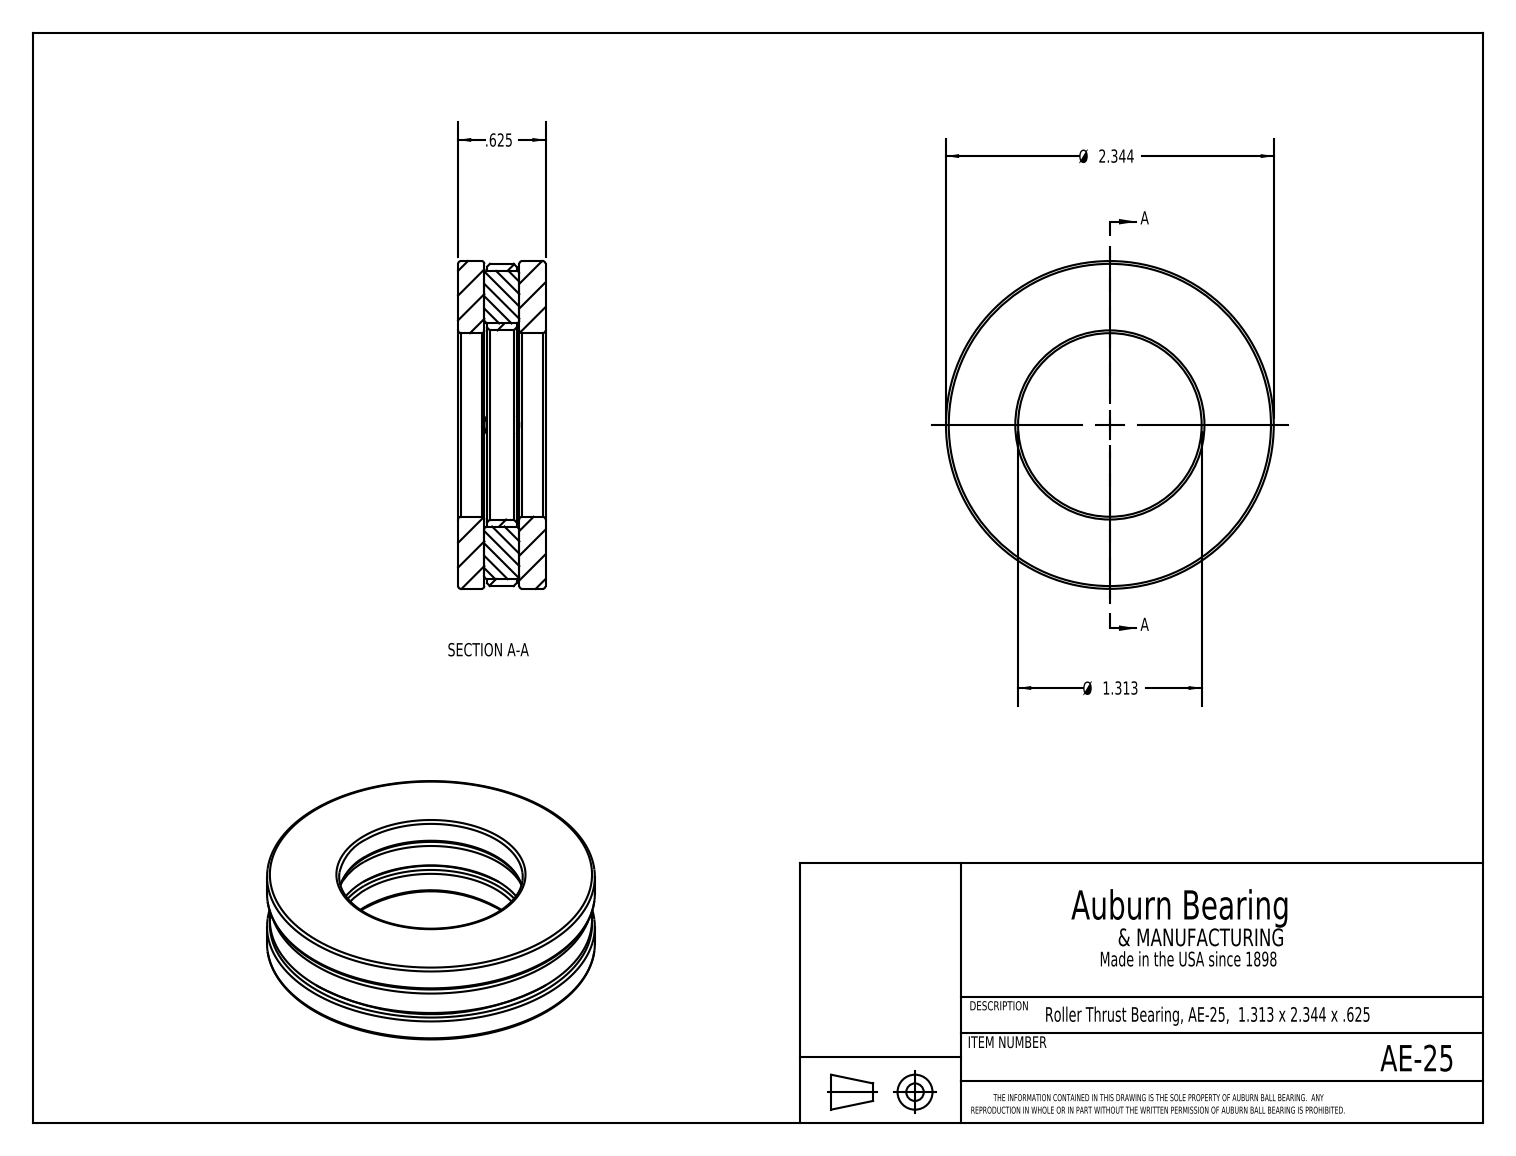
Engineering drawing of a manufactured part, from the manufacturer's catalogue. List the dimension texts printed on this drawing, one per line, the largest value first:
Ø 2.344
Ø 1.313
.625
